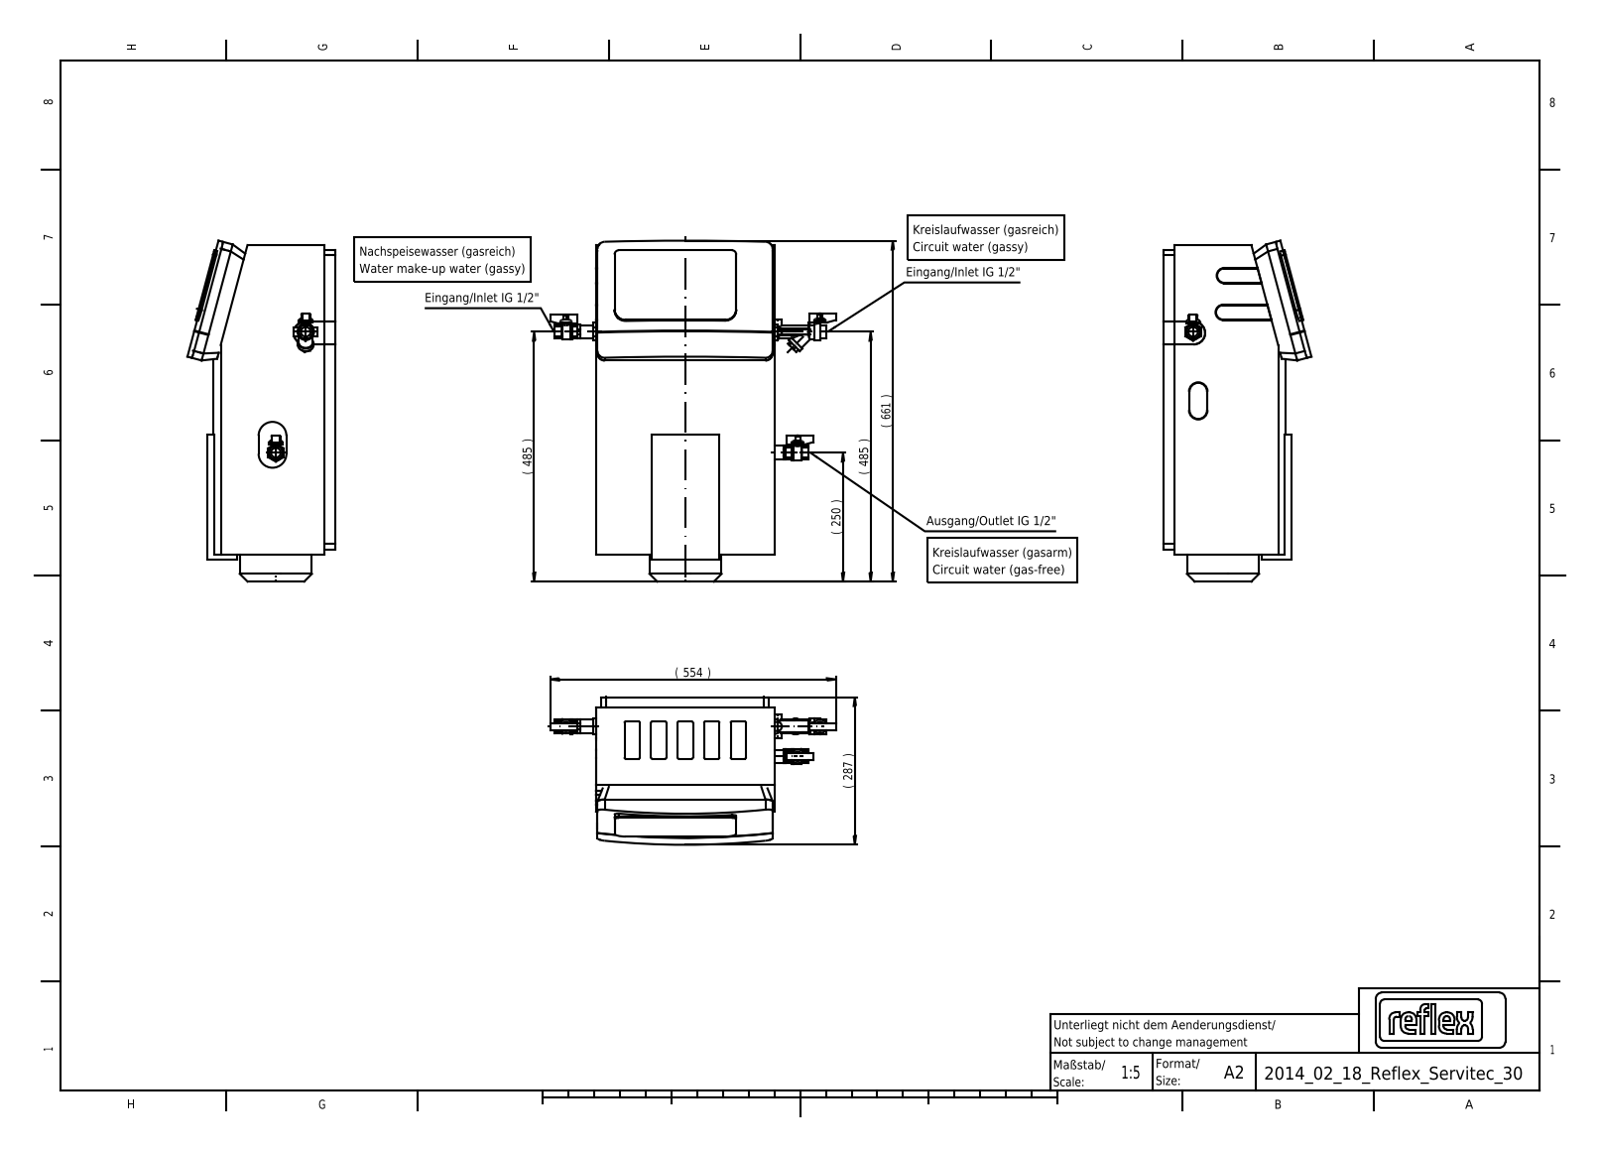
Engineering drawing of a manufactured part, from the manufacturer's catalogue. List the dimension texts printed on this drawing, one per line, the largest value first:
661 ( )
554 ( )
485 ( )
485 ( )
287 ( )
250 ( )
